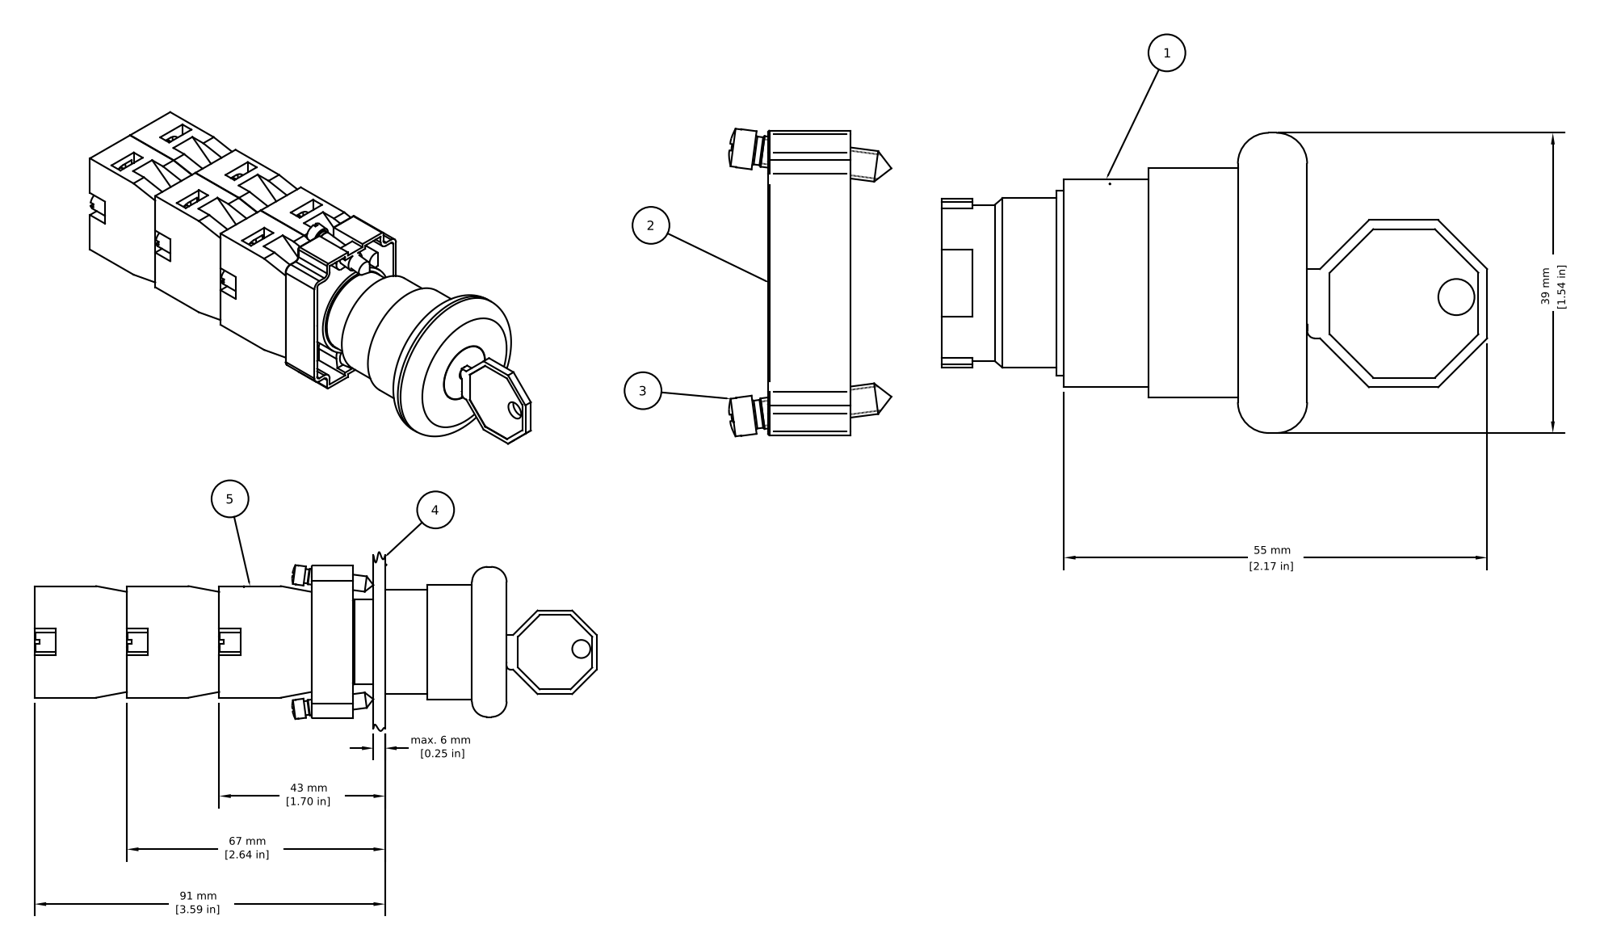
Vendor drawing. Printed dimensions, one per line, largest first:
91.10[]
67.10[]
55.00[]
43.10[]
39.00[]
max. 6 mm\P[0.25 in}]
